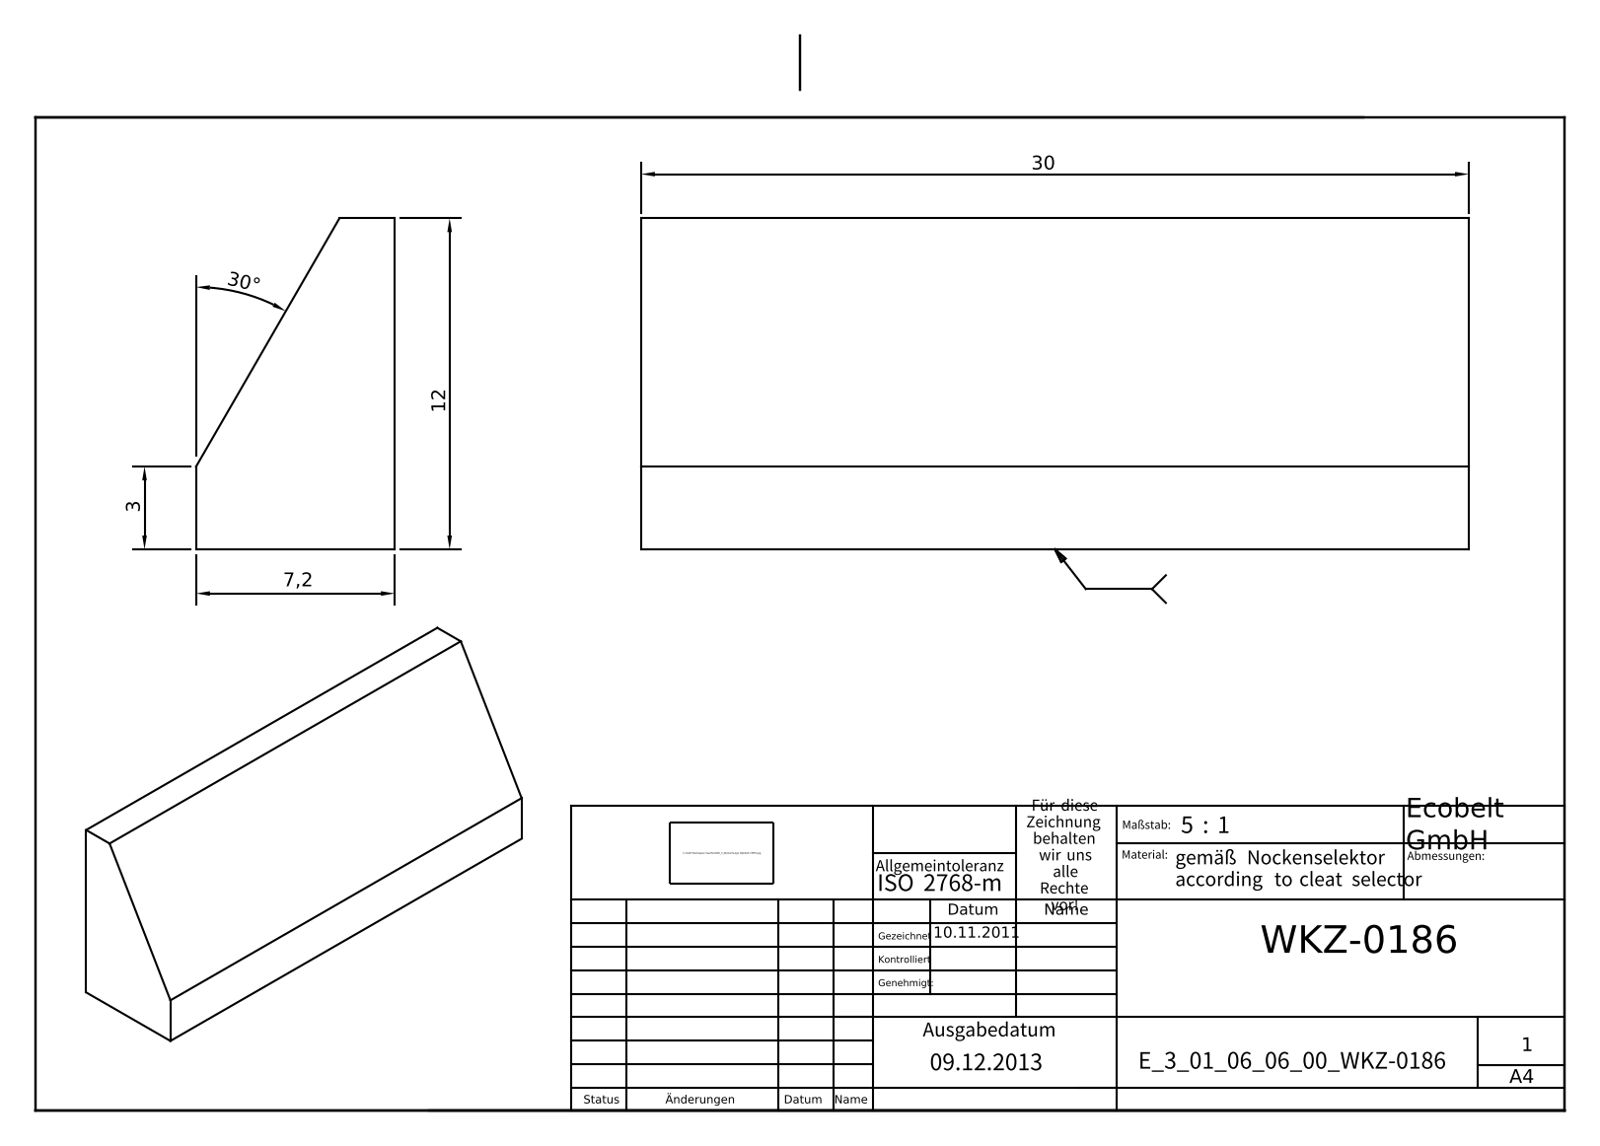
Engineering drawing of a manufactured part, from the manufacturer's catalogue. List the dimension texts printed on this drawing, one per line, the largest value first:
30°
30
12
7,2
3
